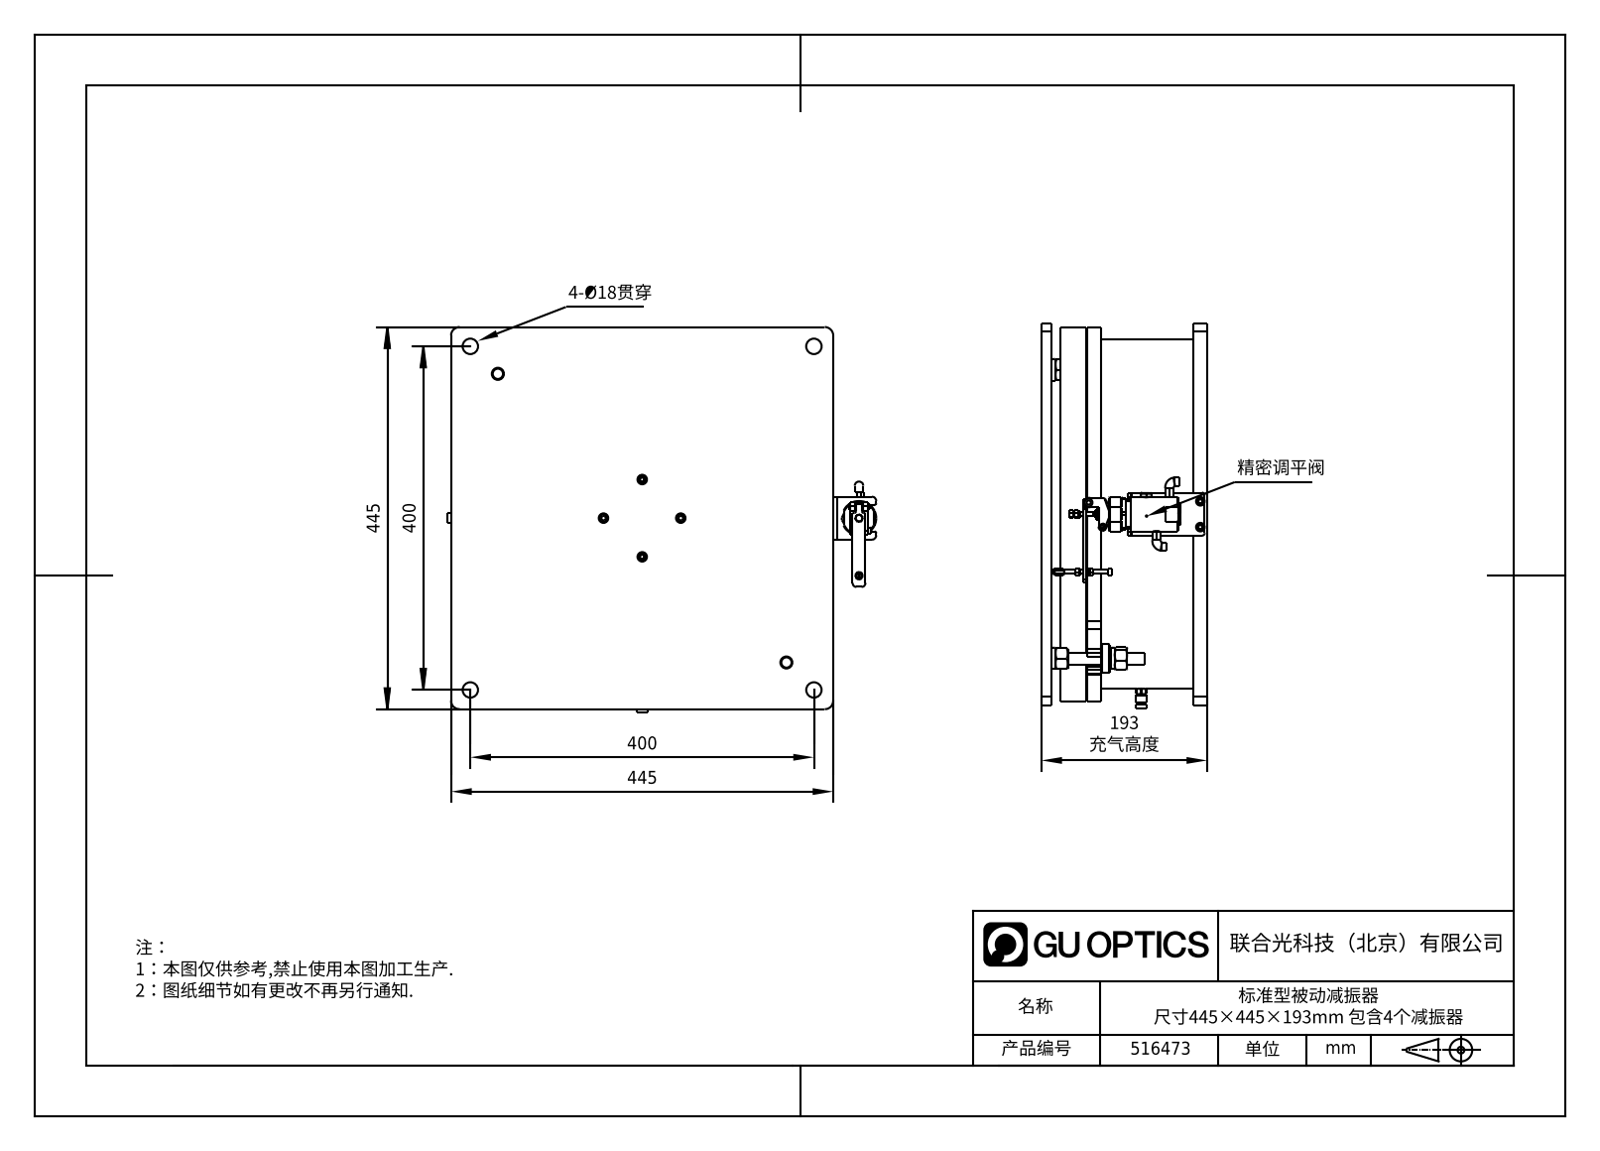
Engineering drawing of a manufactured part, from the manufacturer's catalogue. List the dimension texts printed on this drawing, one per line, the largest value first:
445
445
400
400
193 充气高度
